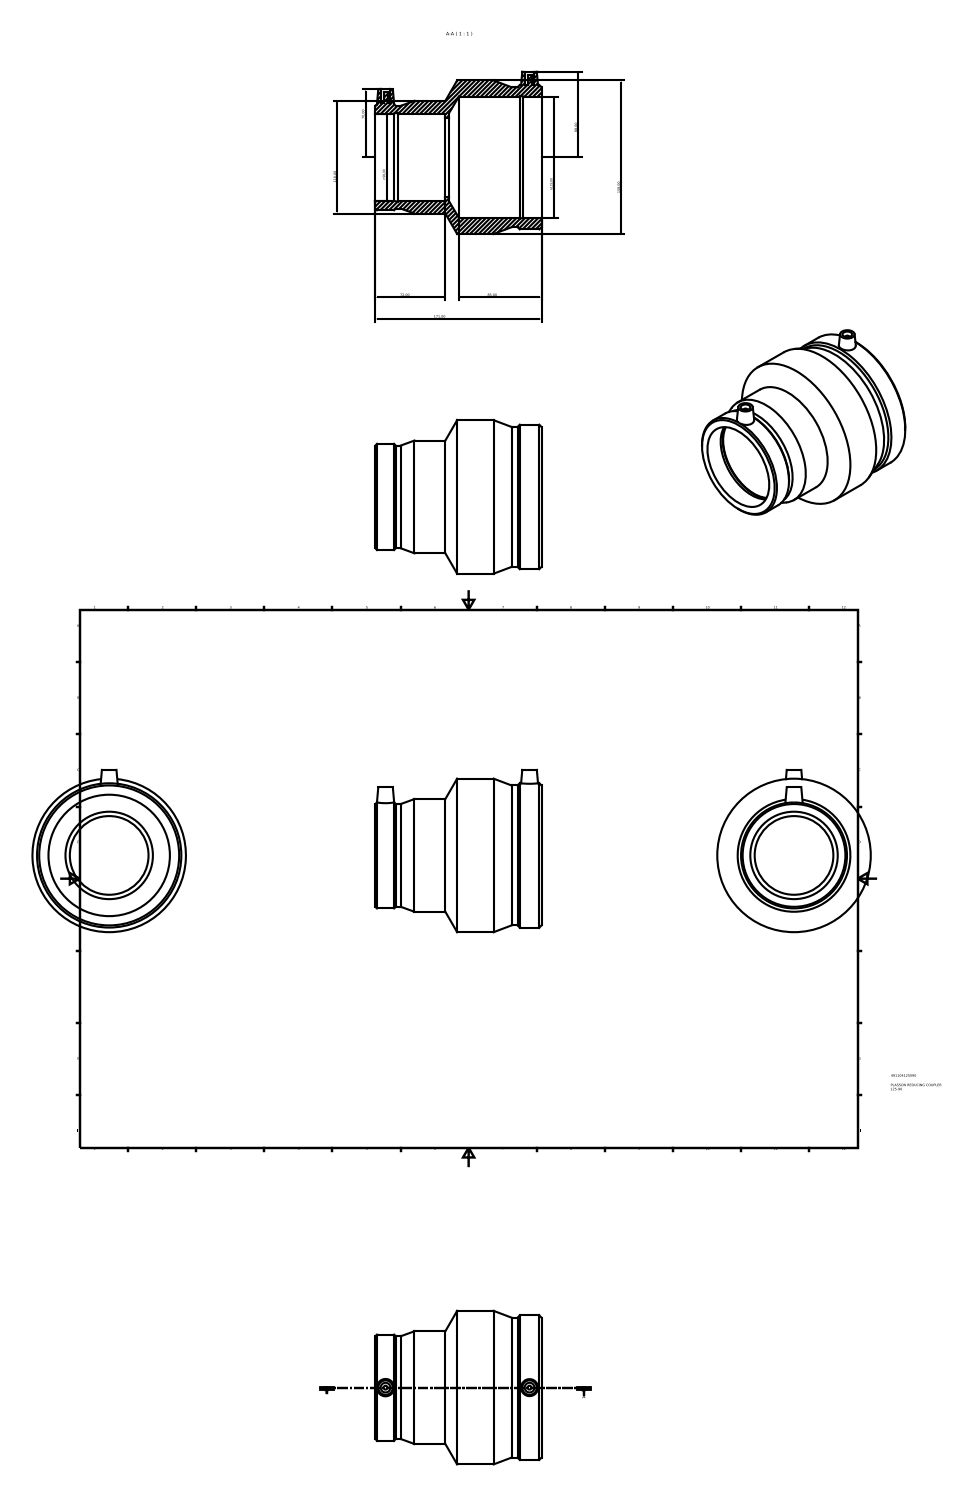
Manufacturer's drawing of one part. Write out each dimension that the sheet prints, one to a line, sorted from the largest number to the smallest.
171,00
158,00
n125,00
116,00
n90,00
88,00
85,00
72,00
70,00
